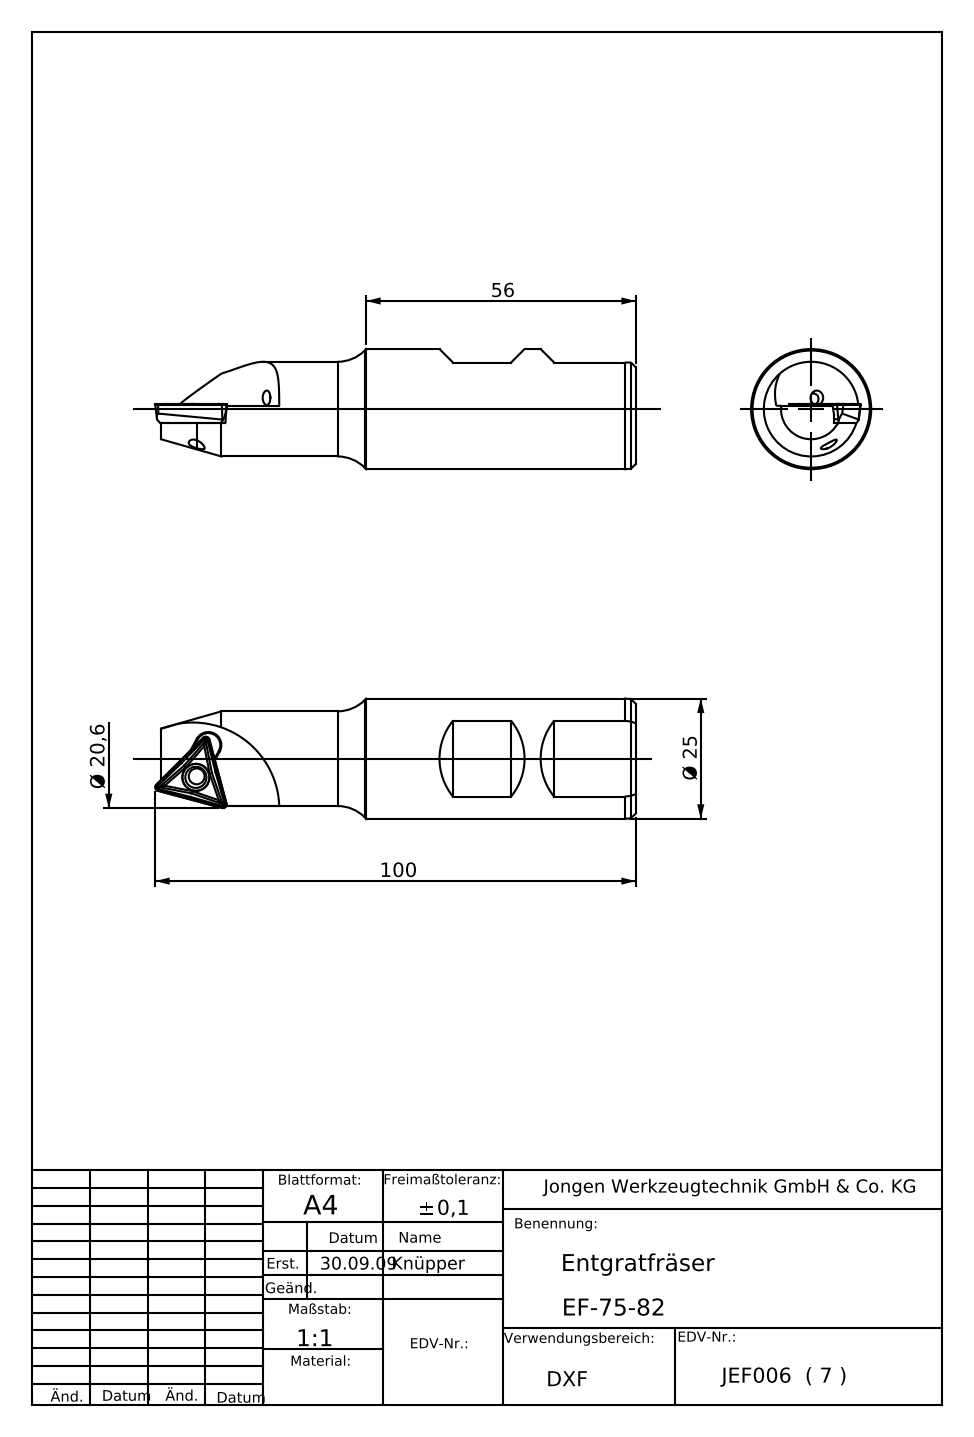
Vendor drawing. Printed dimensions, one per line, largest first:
100
56
Ø 25
Ø 20,6
